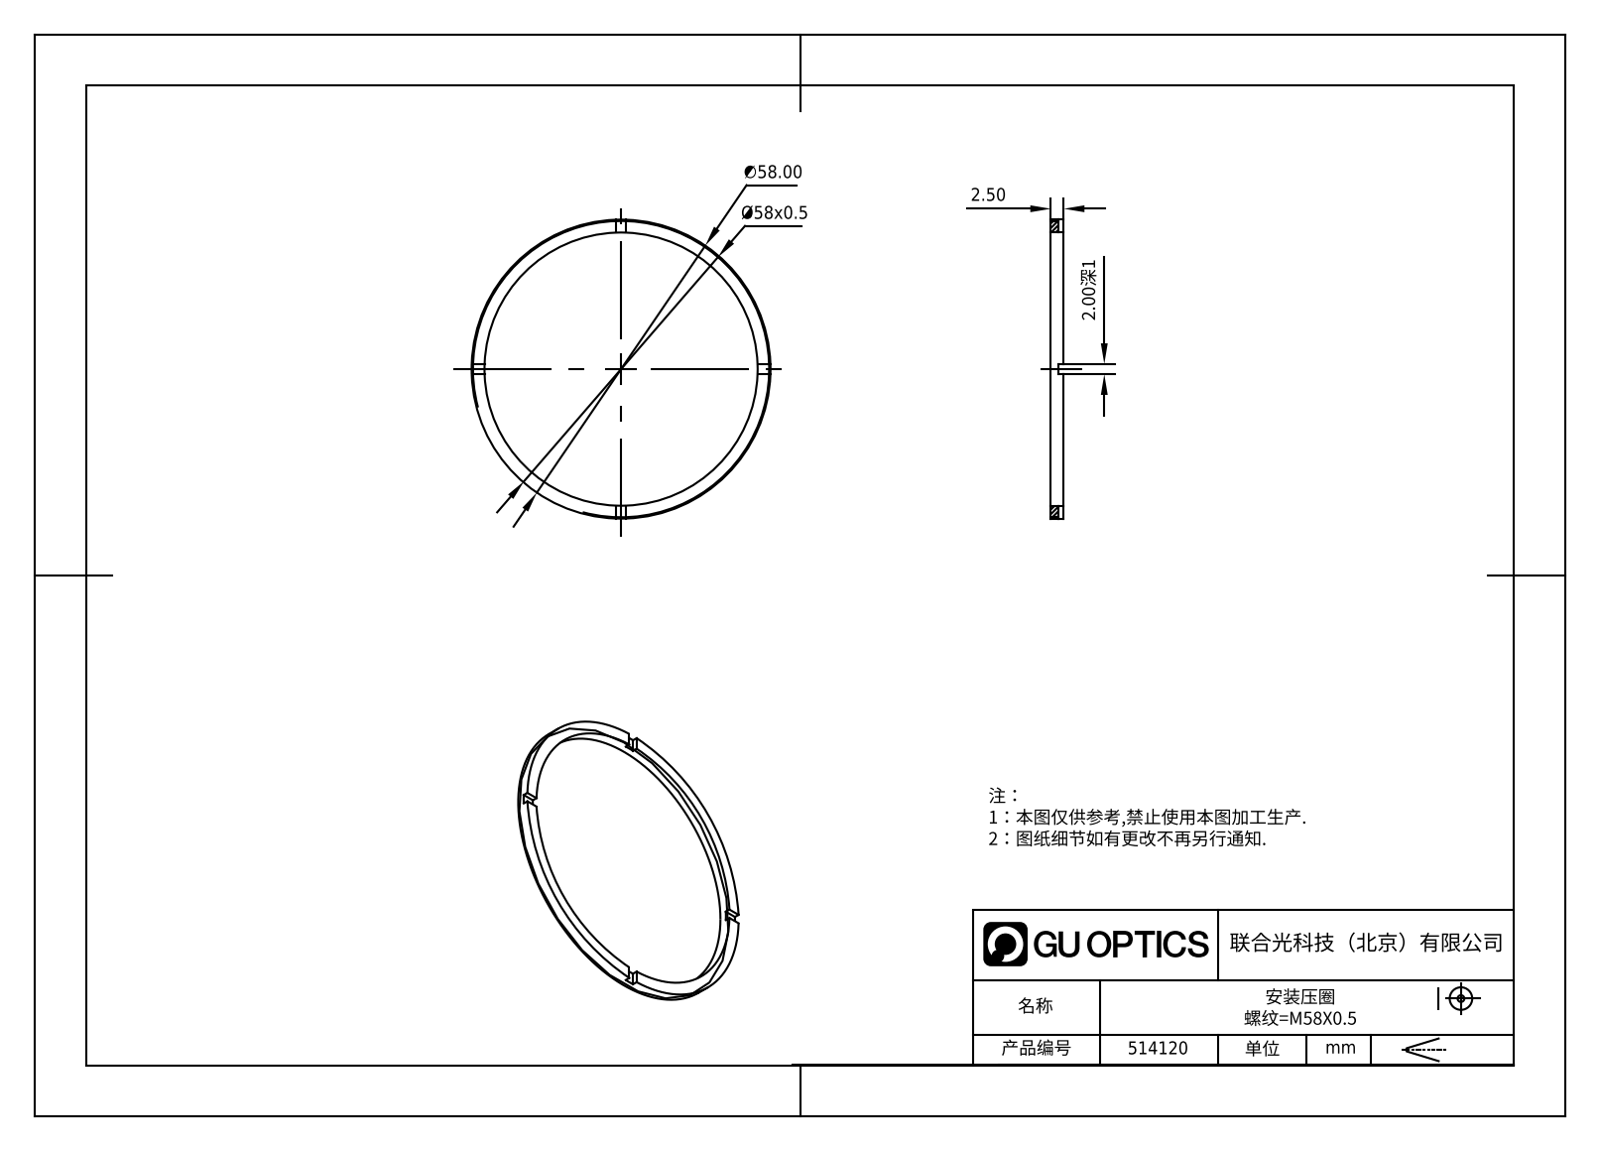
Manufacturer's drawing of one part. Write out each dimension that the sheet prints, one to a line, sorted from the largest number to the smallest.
∅58.00
Ø58x0.5
2.50
2.00深1
